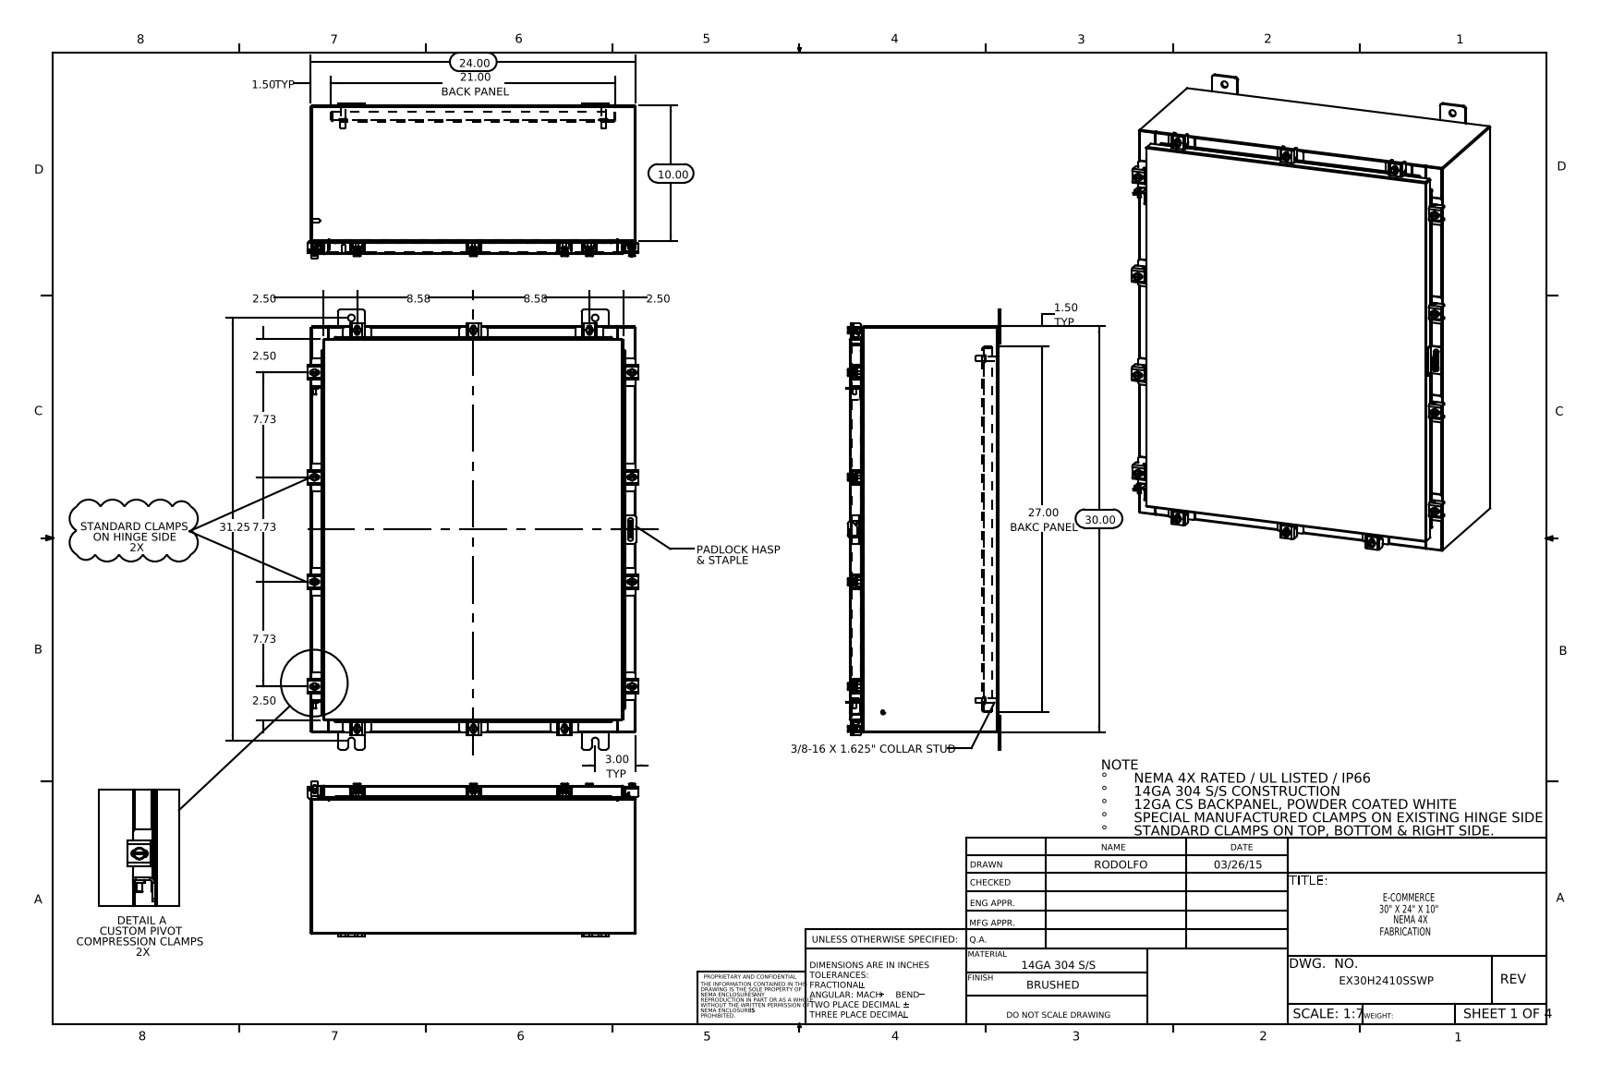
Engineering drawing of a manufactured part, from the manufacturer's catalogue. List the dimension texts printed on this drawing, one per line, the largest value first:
31.25
30.00
27.00 BAKC PANEL
24.00
21.00 BACK PANEL
10.00
8.58
8.58
7.73
7.73
7.73
3.00 TYP
2.50
2.50
2.50
2.50
1.50 TYP
1.50 TYP
